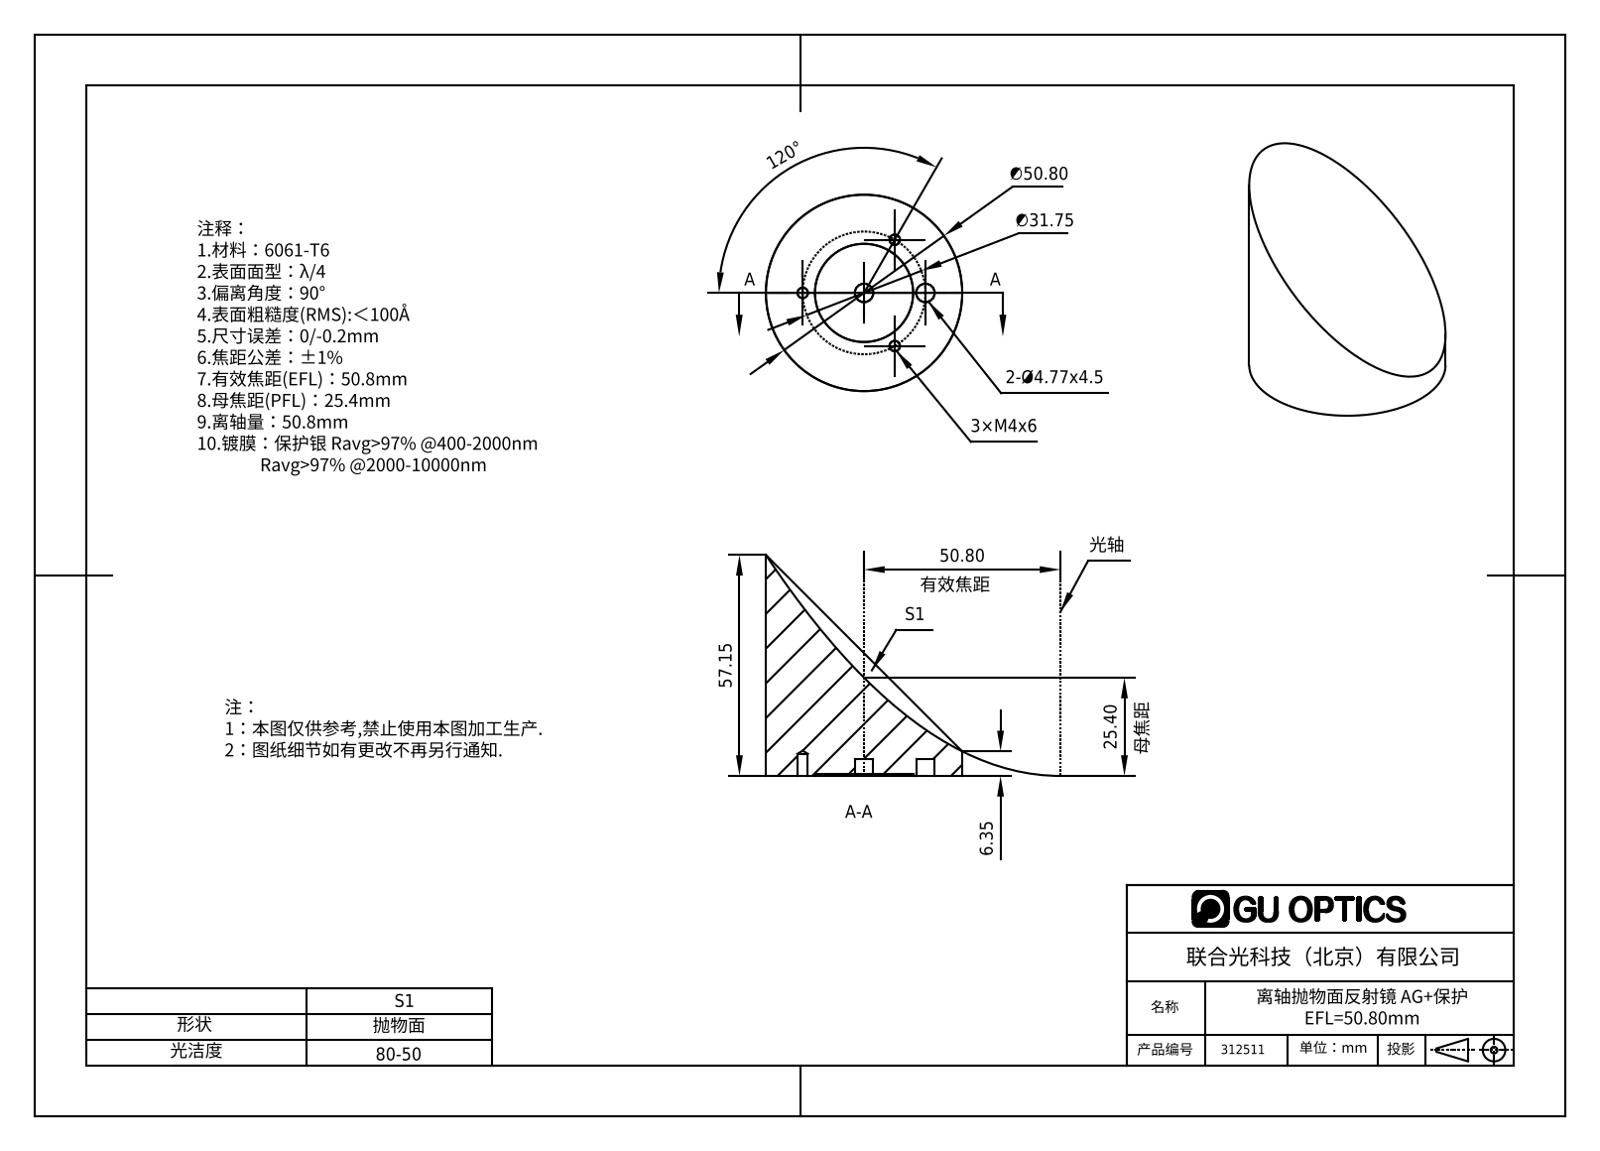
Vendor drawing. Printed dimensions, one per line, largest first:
120°
57.15
50.80
∅50.80
∅31.75
25.40
6.35
